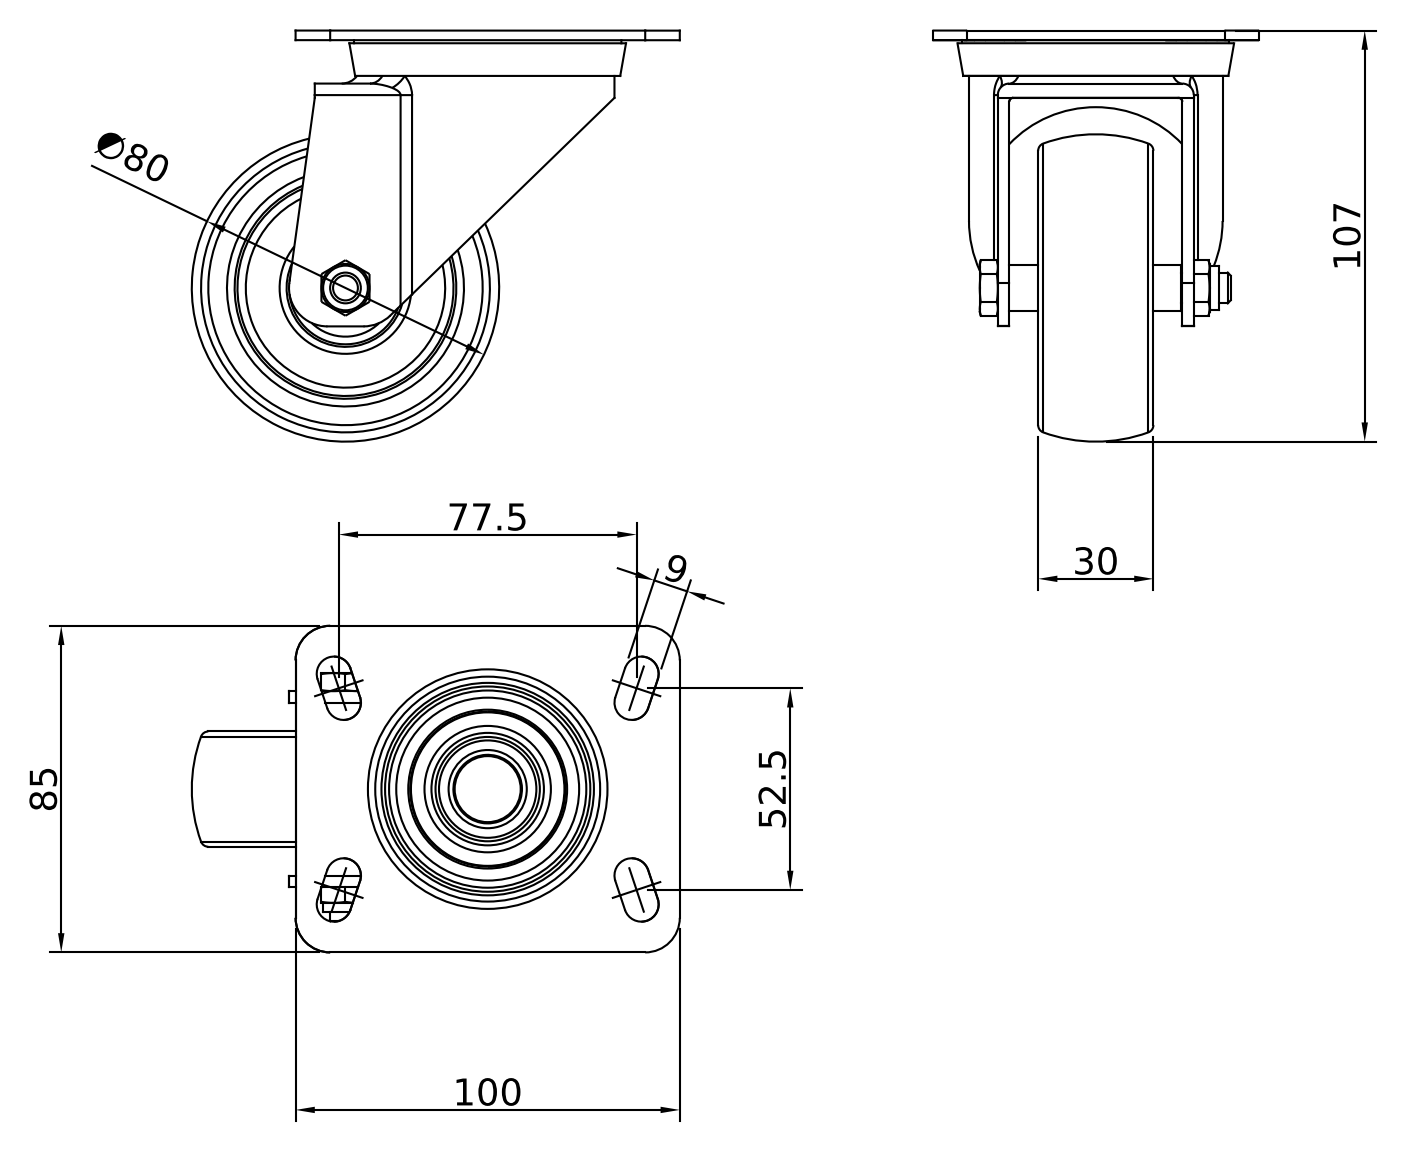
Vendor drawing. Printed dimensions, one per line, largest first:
107
100
85
∅80
77.5
52.5
30
9
